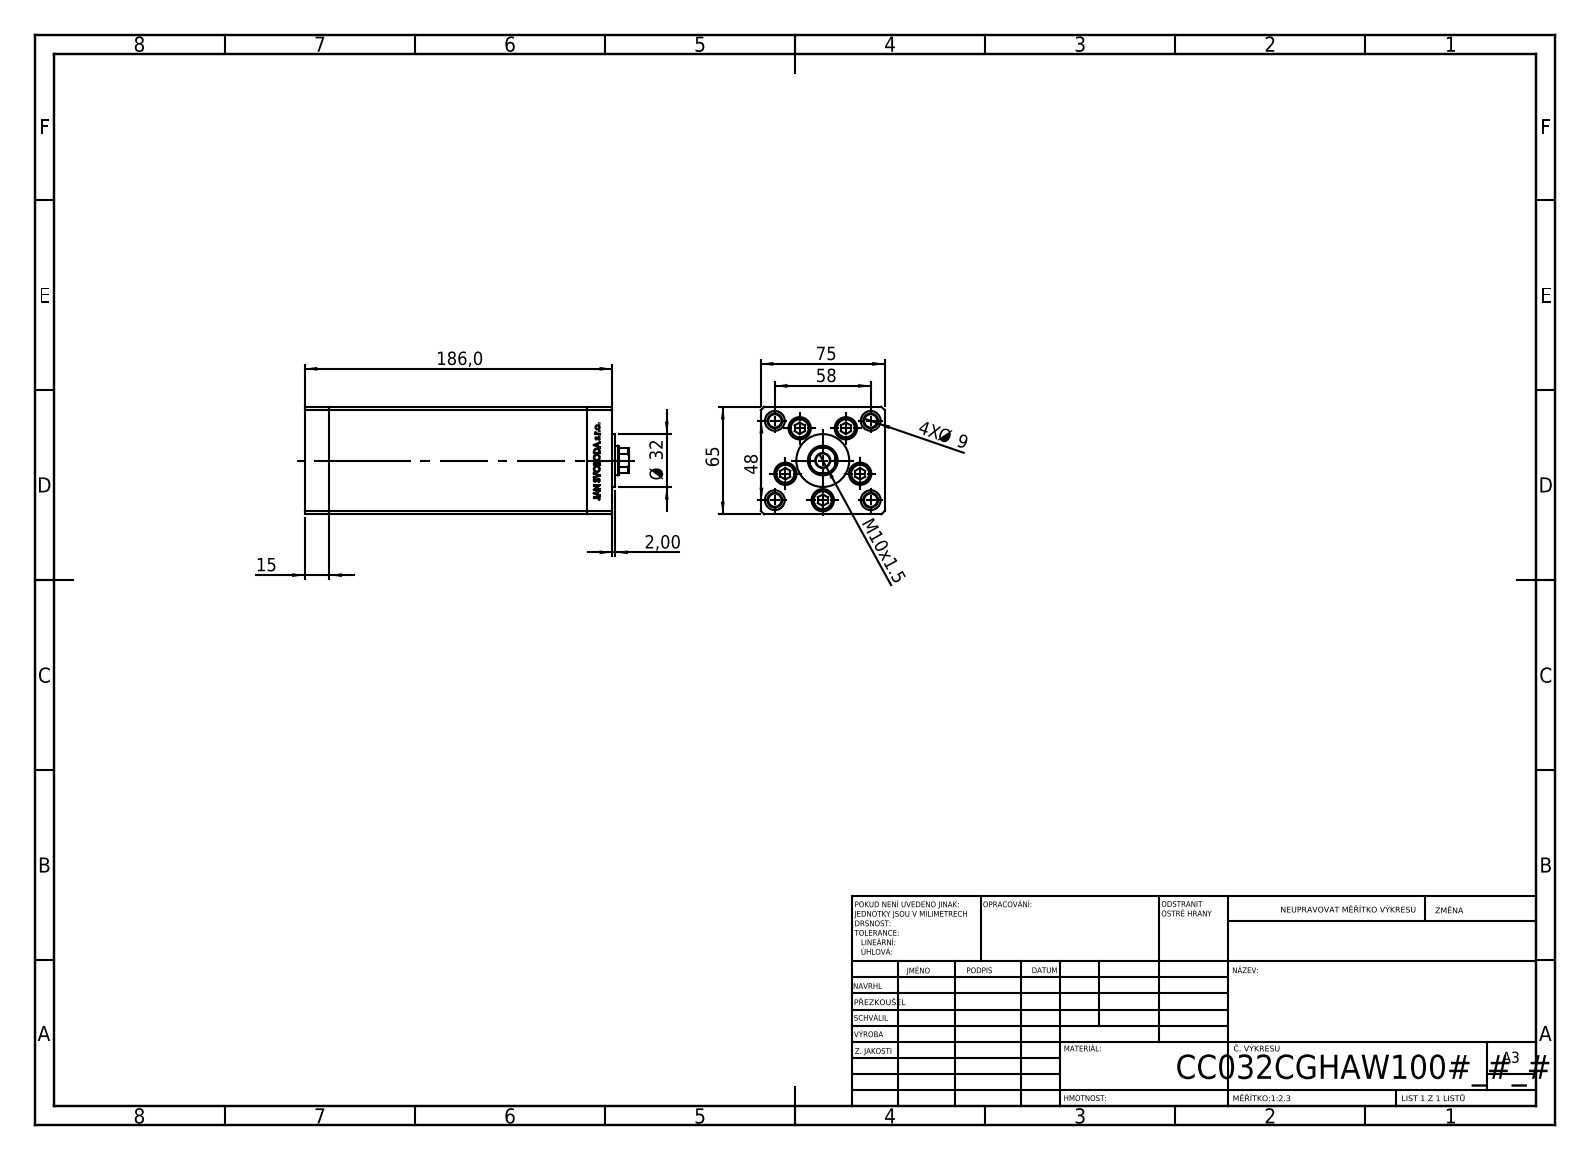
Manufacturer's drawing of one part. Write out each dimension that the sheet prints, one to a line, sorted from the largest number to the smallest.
186,0
75
65
58
48
Ø 32
15
M10x1.5
4X Ø 9
2,00
